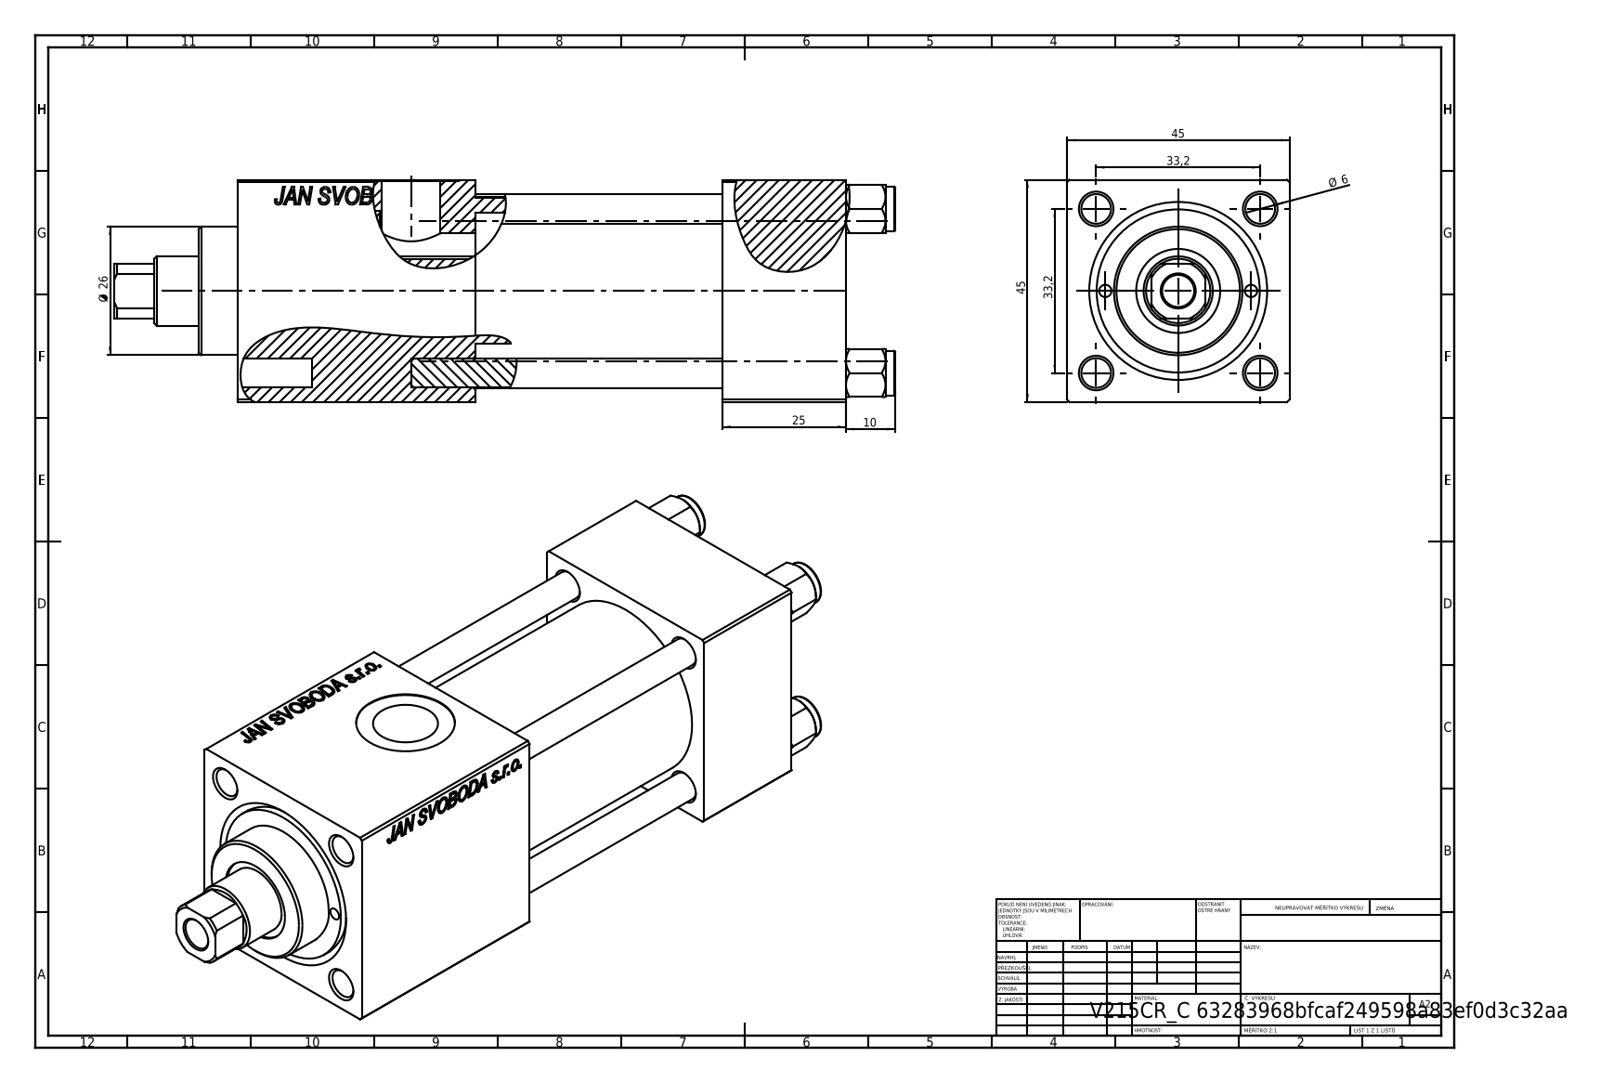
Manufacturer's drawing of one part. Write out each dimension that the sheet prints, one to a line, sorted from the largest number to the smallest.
45
45
33,2
33,2
Ø 26
25
10
Ø 6
